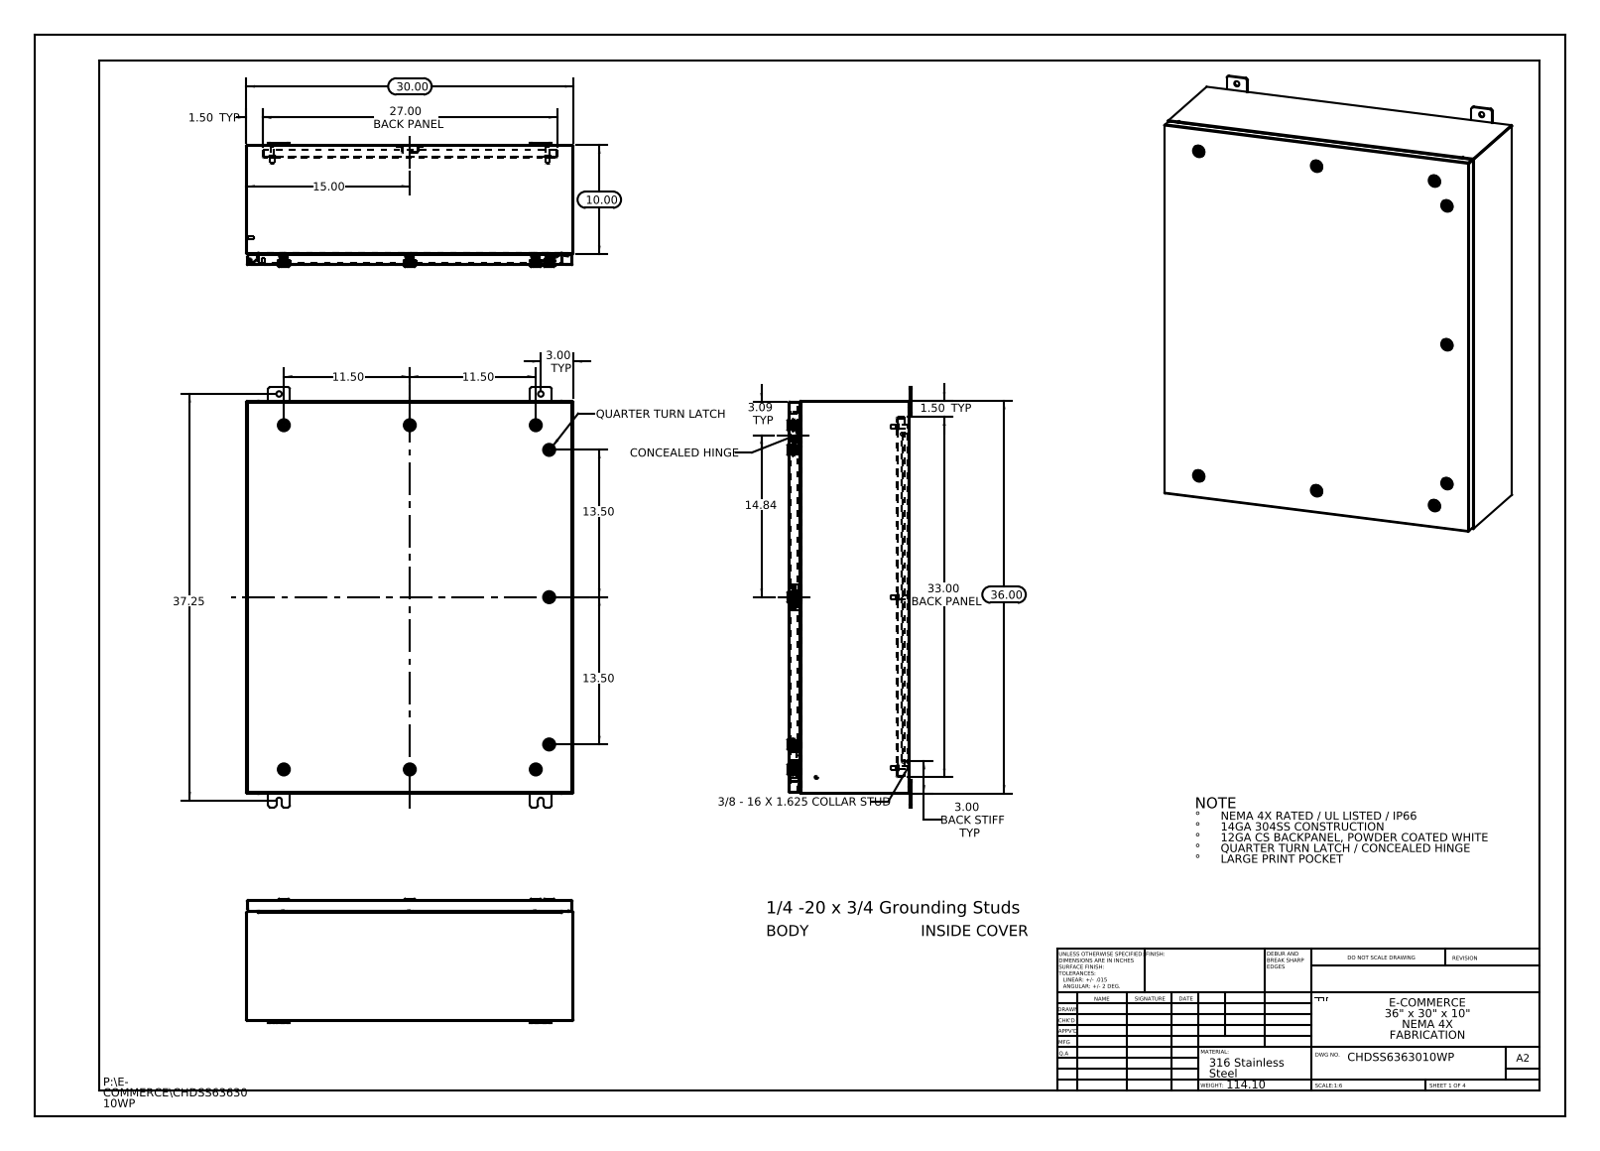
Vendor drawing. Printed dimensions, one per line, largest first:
37.25
36.00
33.00 BACK PANEL
30.00
27.00 BACK PANEL
15.00
14.84
13.50
13.50
11.50
11.50
10.00
3.09 TYP
3.00 TYP
3.00 BACK STIFF TYP
1.50 TYP
1.50 TYP
